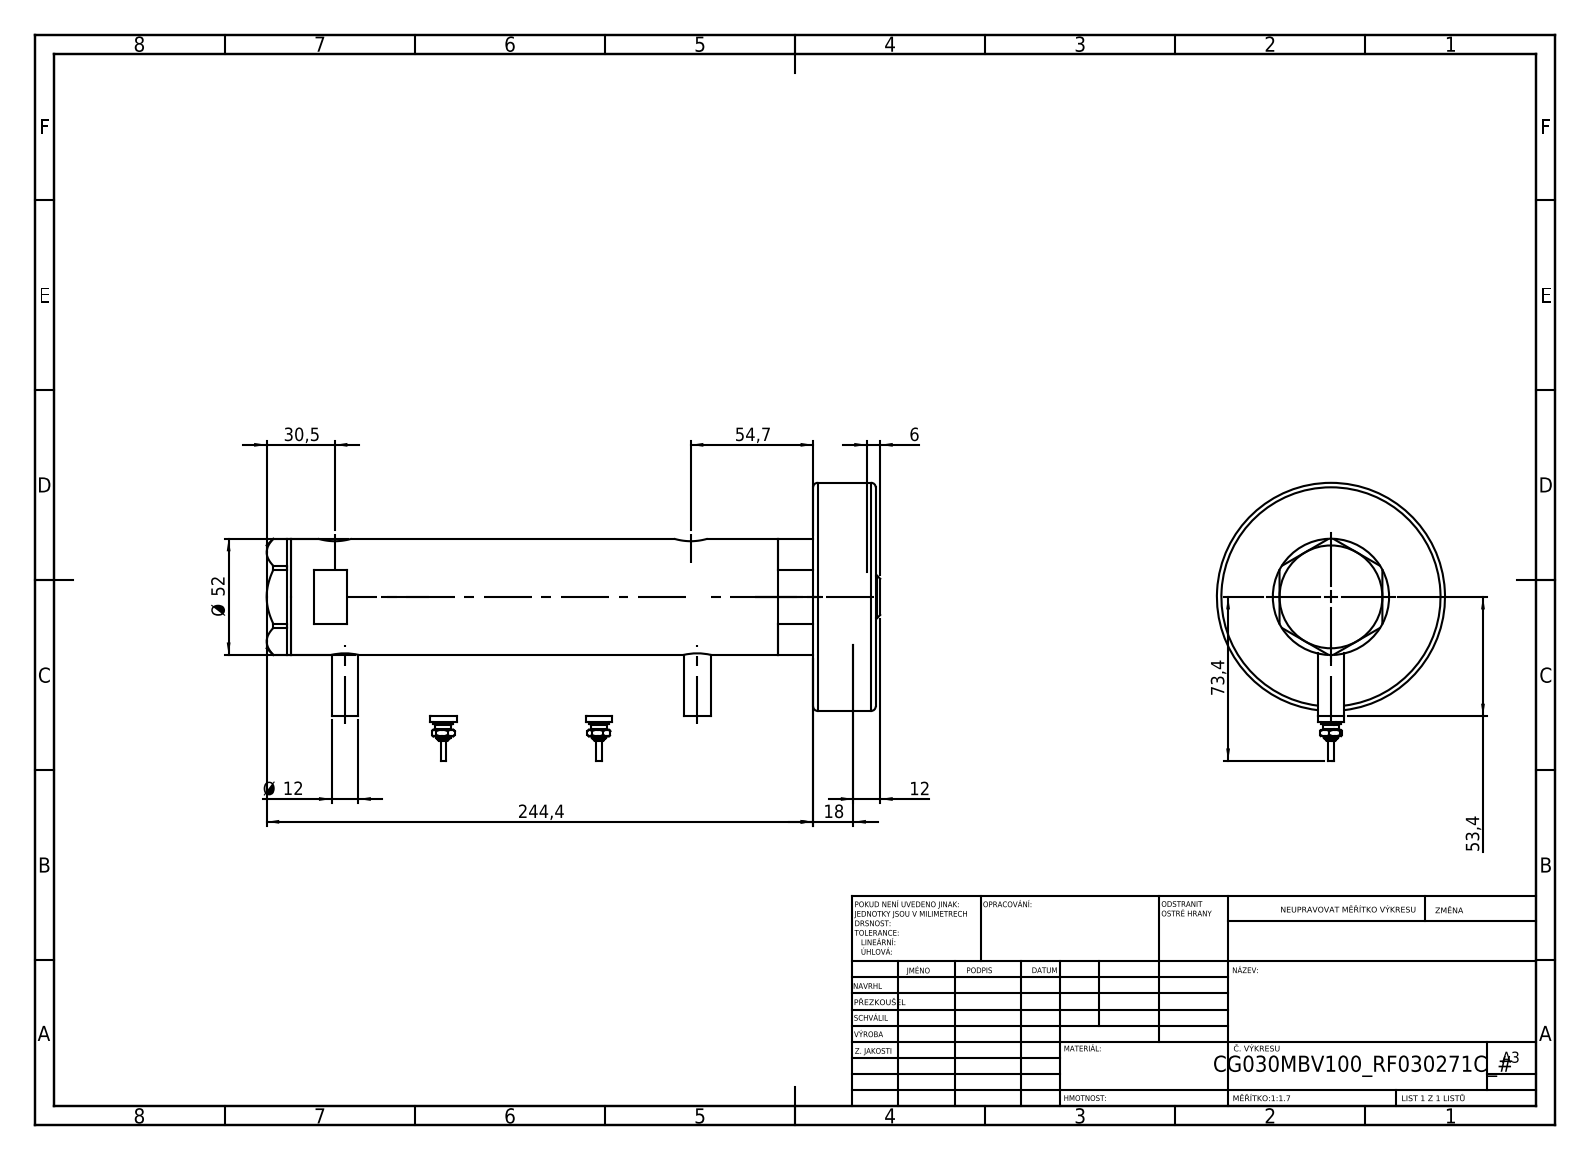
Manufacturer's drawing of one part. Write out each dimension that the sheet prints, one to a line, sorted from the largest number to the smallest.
244,4
73,4
54,7
53,4
Ø 52
30,5
18
12
Ø 12
6
